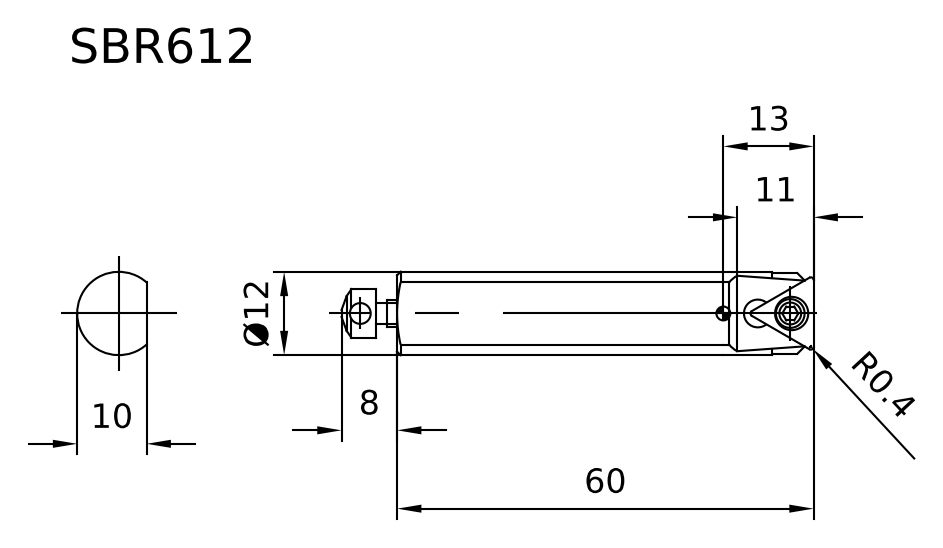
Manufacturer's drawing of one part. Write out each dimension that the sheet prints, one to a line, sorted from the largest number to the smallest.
60
13
Ø12
11
10
8
R0.4
